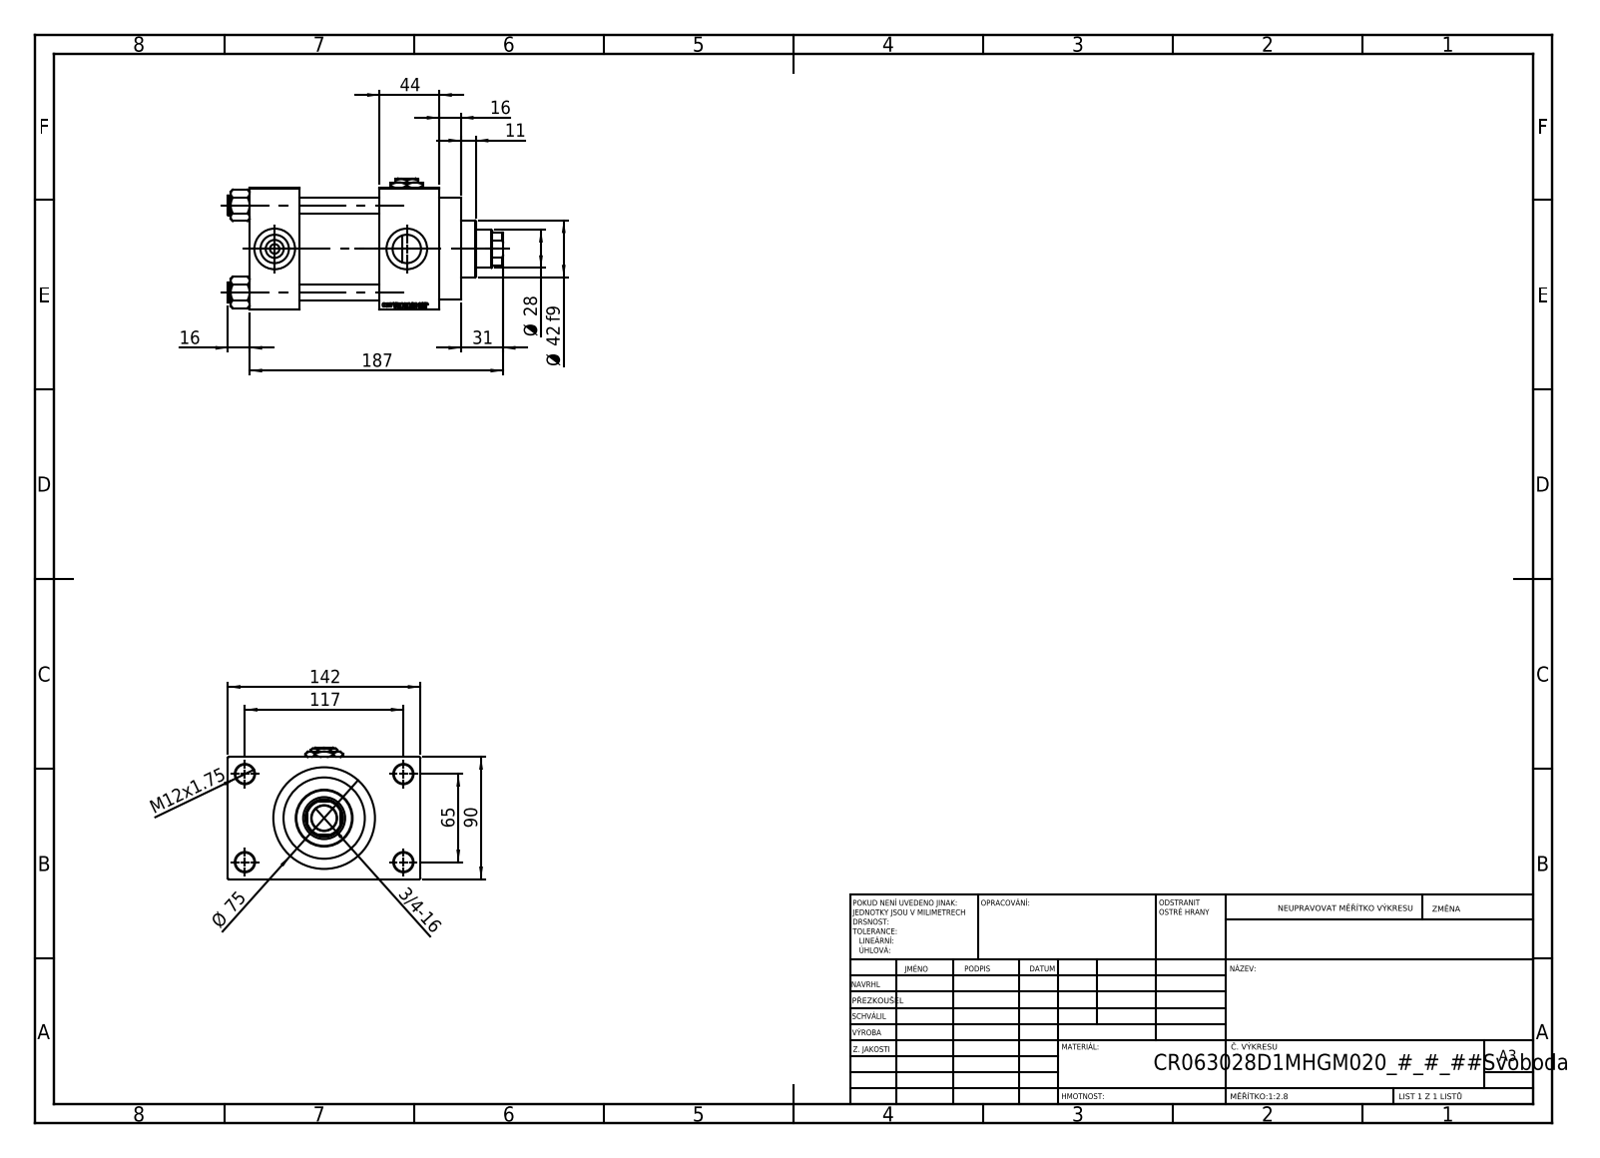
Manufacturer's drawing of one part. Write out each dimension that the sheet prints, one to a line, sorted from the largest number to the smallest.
187
142
117
90
Ø 75
65
44
Ø 42 f9
31
Ø 28
16
16
M12x1.75
11
3/4-16
